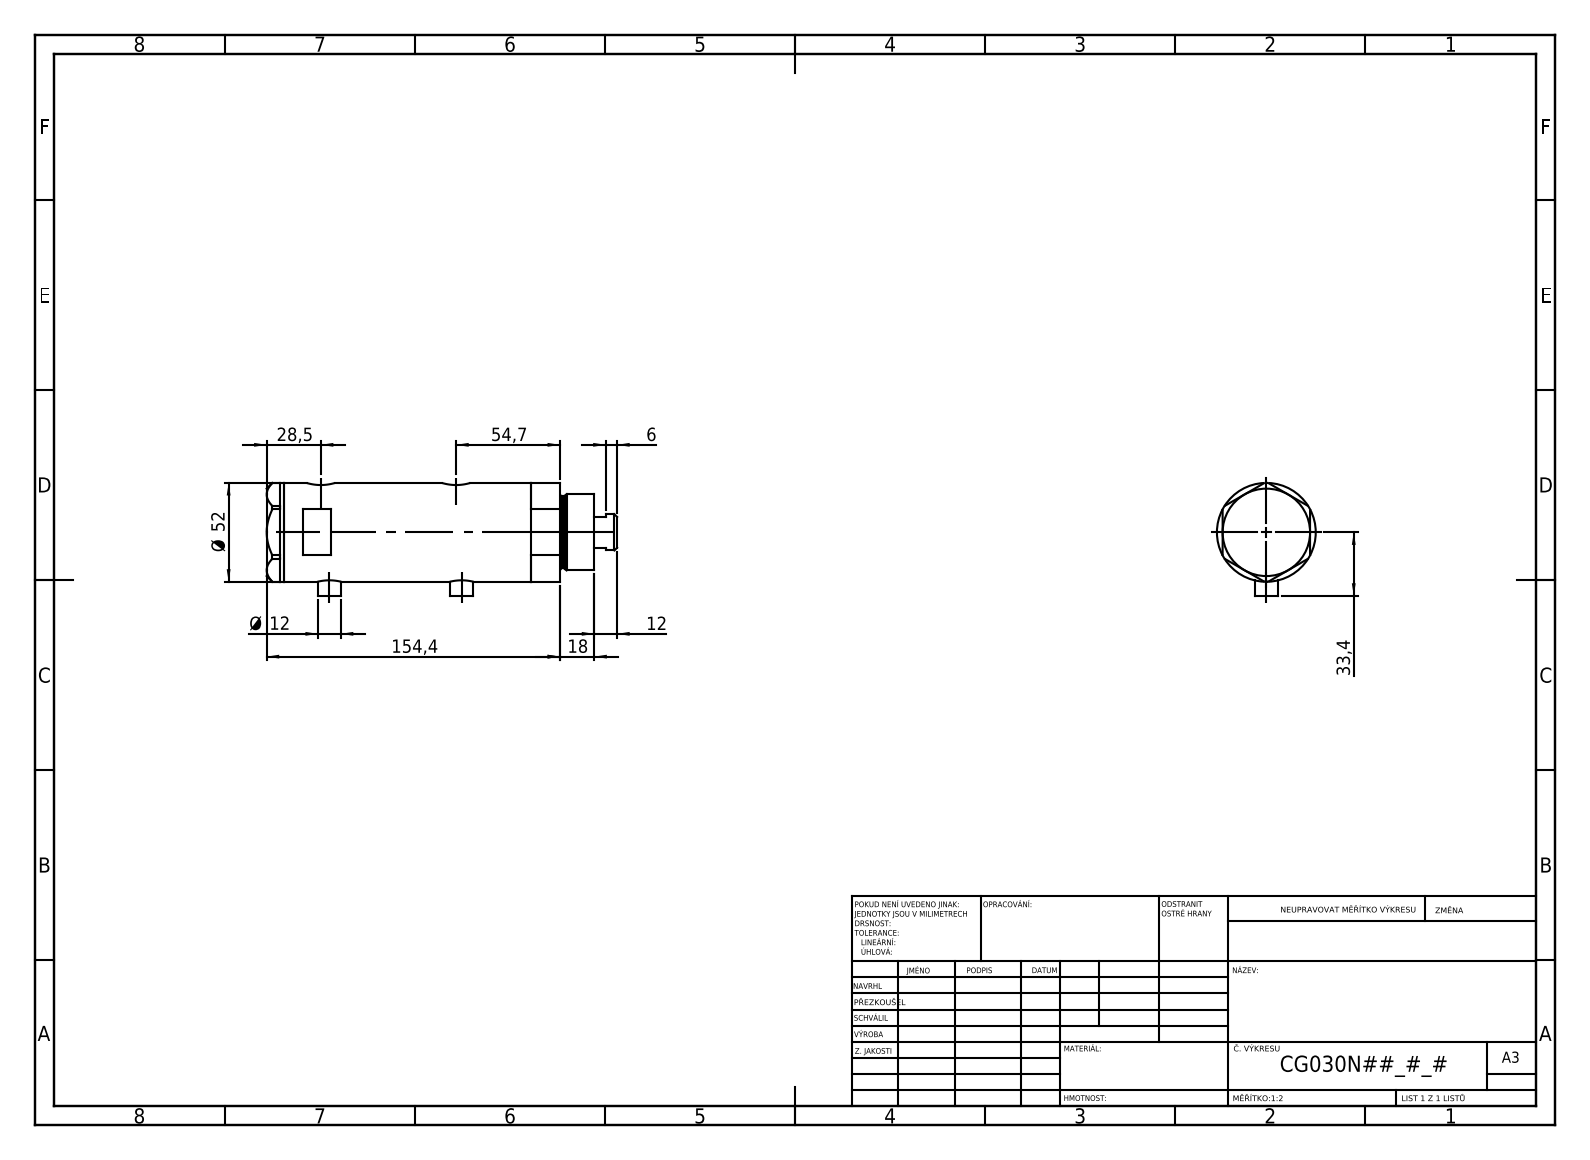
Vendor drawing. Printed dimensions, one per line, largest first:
154,4
54,7
Ø 52
33,4
28,5
18
12
Ø 12
6
